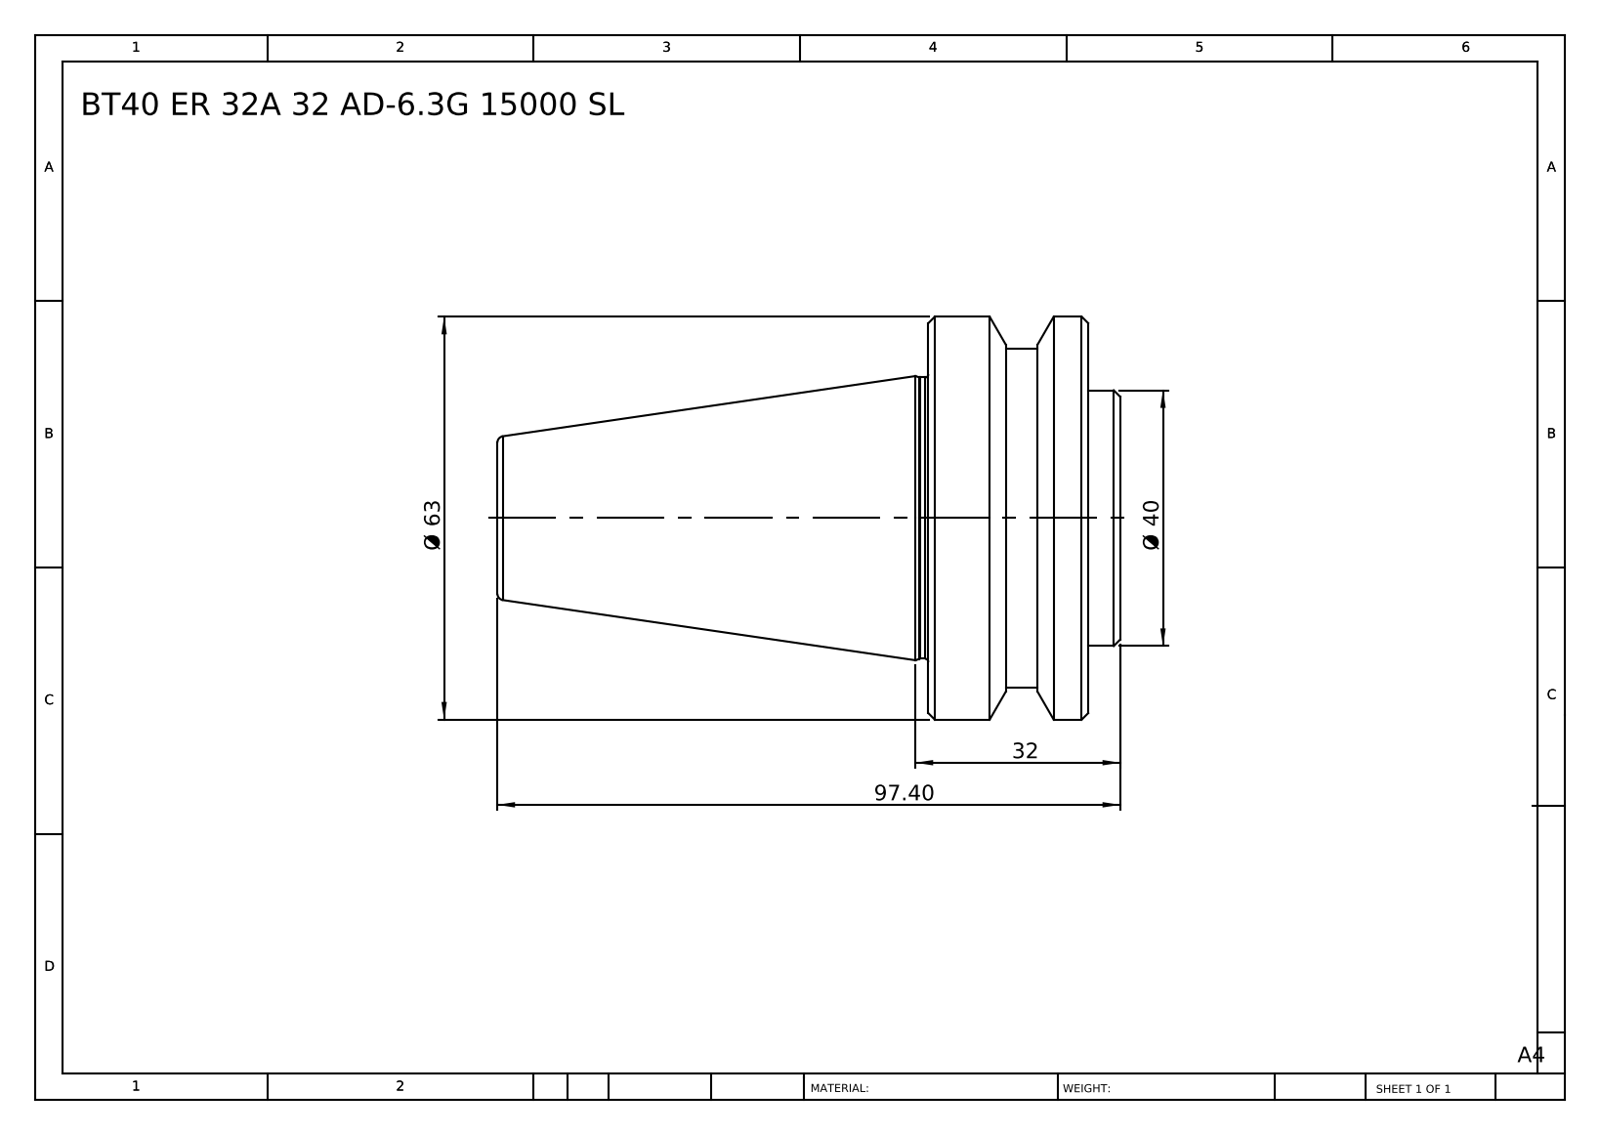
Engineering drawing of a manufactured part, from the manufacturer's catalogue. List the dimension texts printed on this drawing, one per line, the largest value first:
97.40
Ø 63
Ø 40
32
